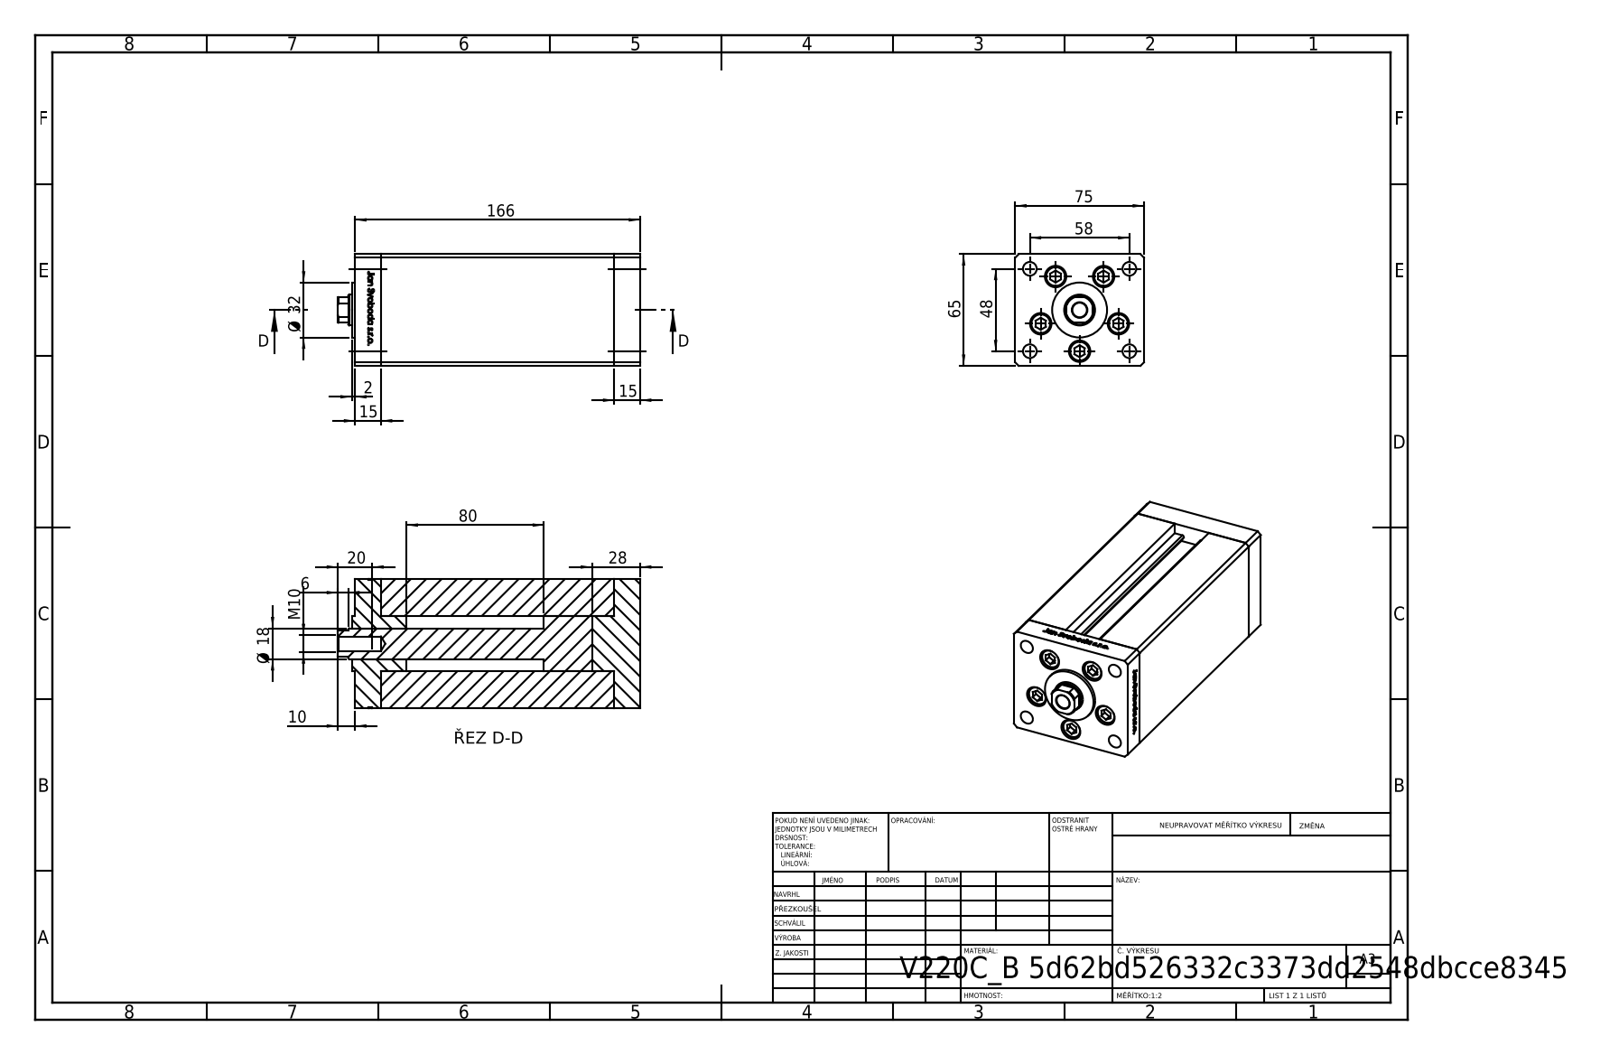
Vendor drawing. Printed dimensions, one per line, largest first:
166
80
75
65
58
48
Ø 32
28
20
Ø 18
15
15
M10
10
6
2
